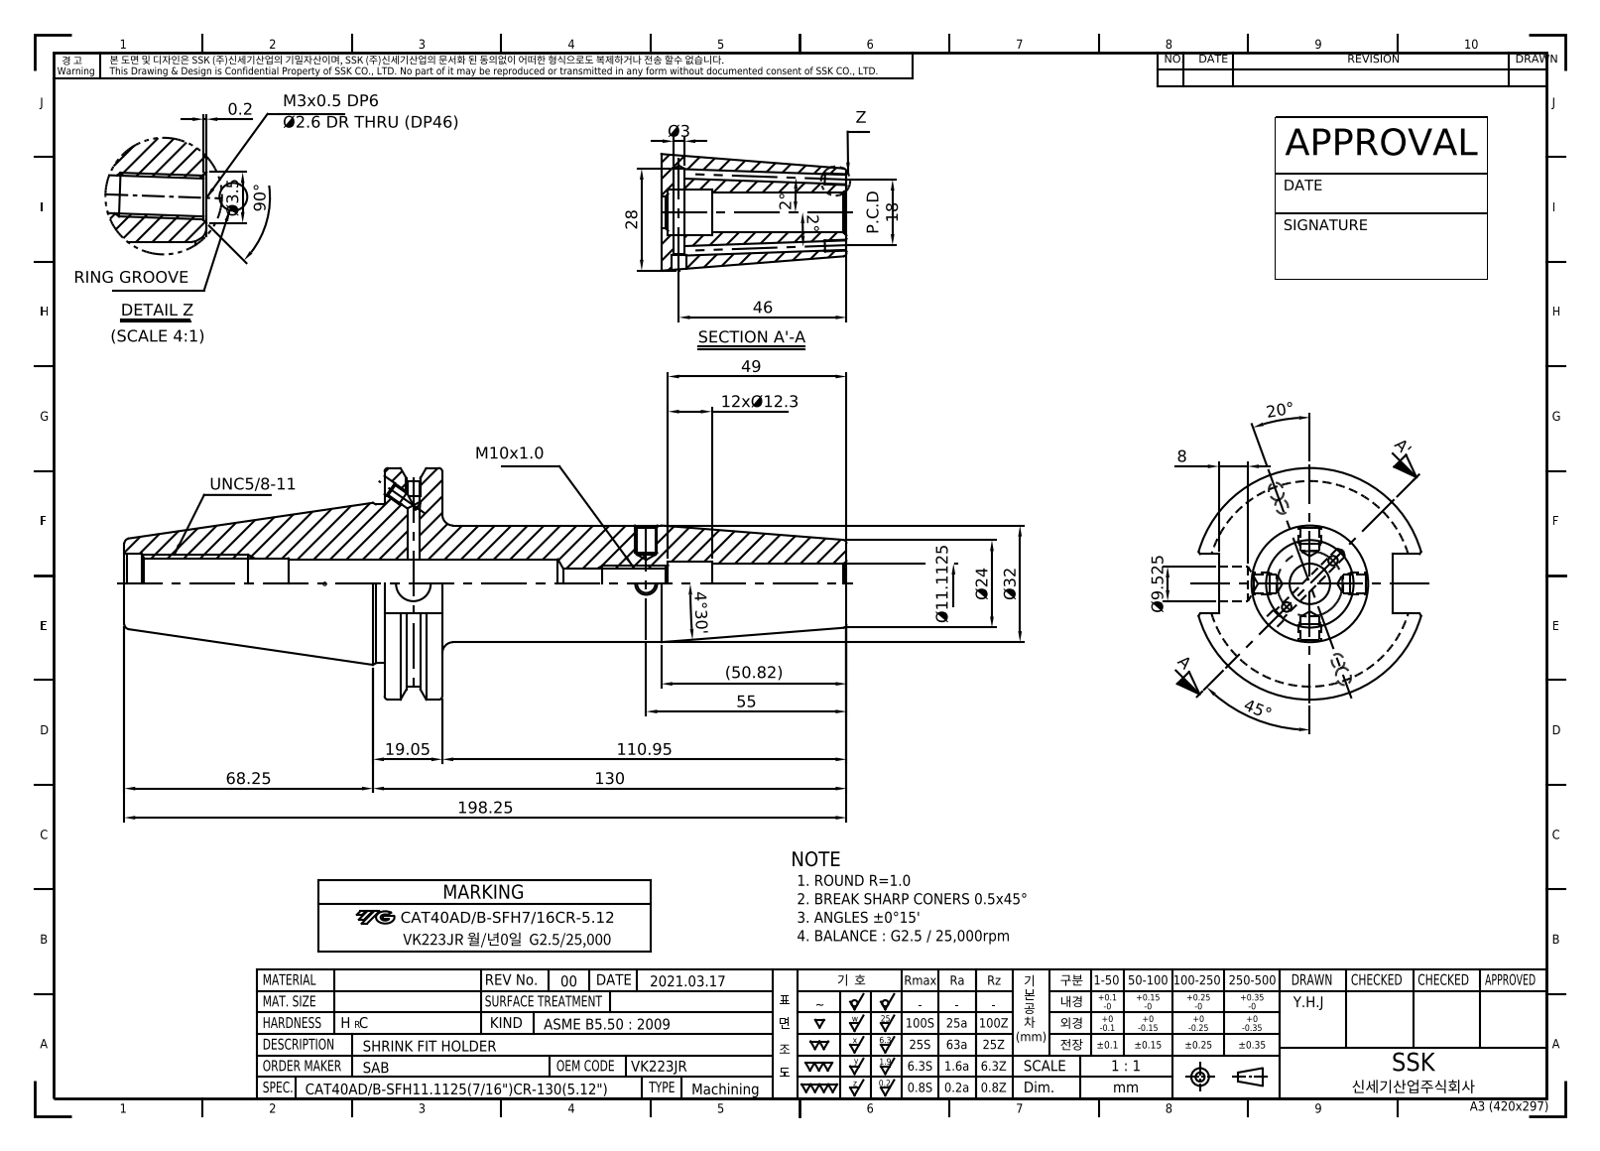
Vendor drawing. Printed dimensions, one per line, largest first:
198.25
130
110.95
90°
68.25
55
(50.82)
49
46
45°
Ø32
28
Ø24
20°
19.05
P.C.D 18
12xØ12.3
Ø11.1125
Ø9.525
8
4°30'
Ø3.5
Ø3
2°
2°
0.2
